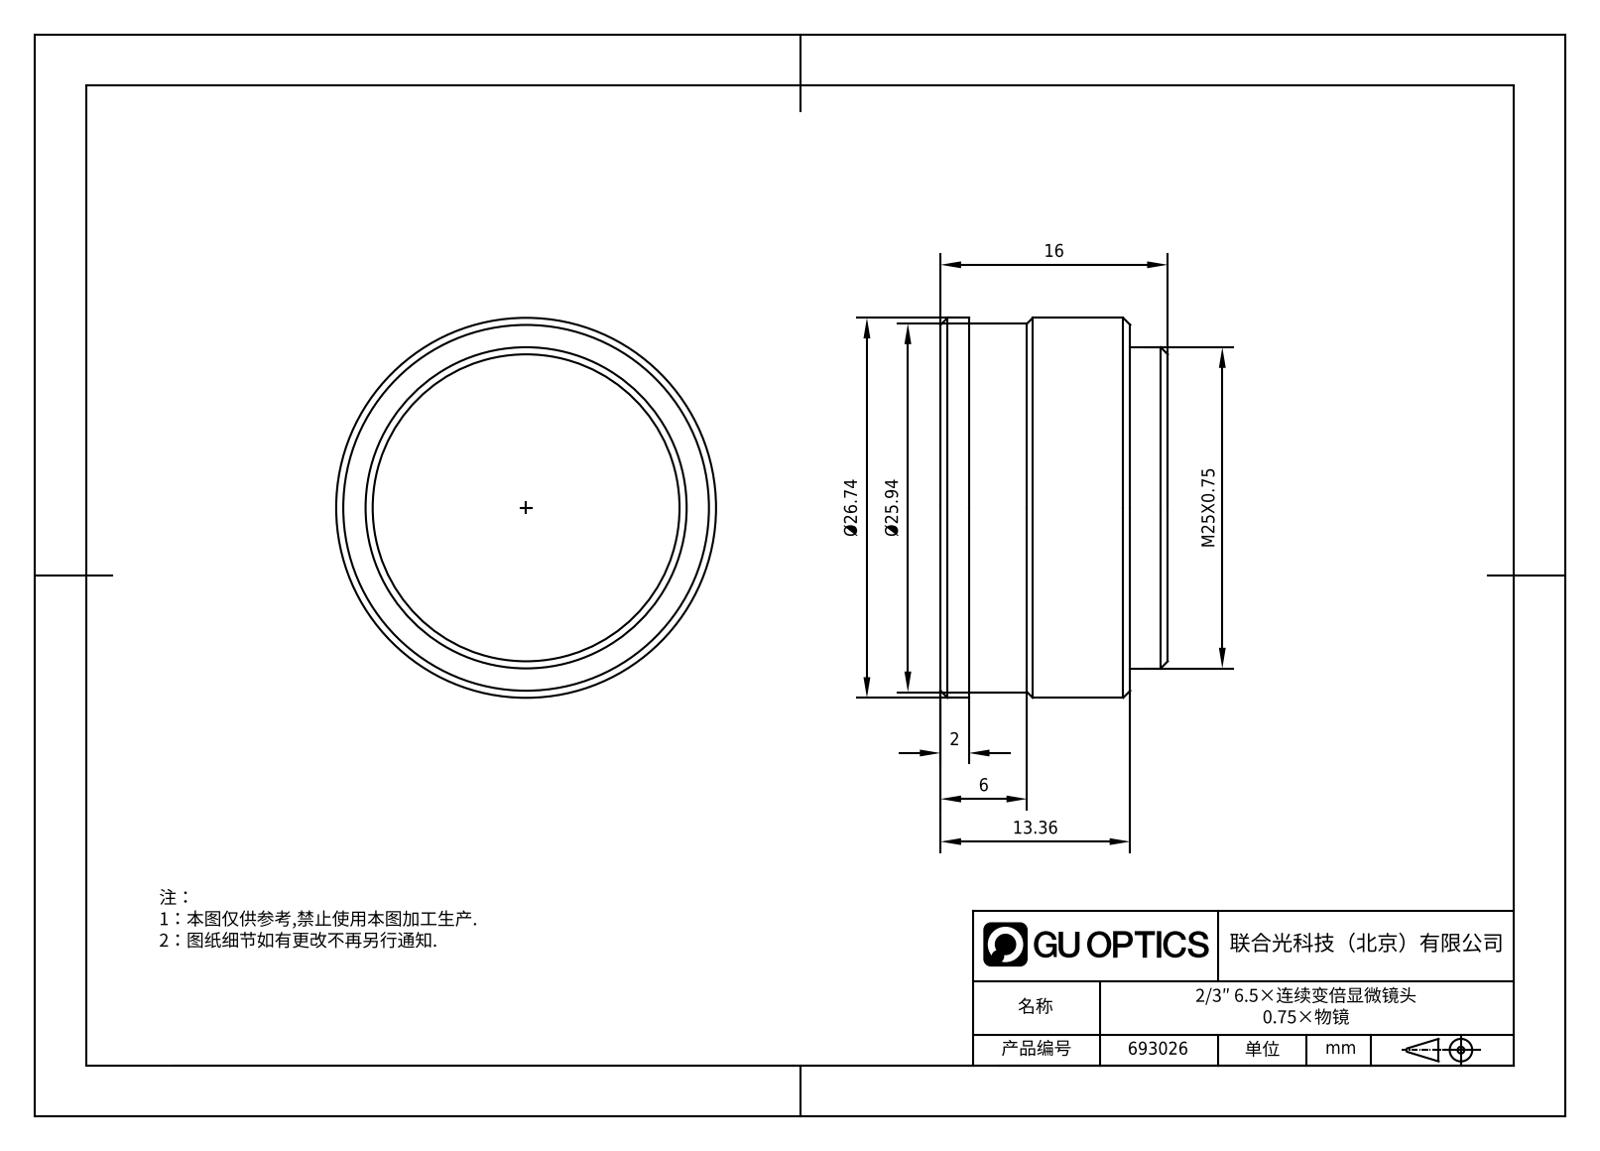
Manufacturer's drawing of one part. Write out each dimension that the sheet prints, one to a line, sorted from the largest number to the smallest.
Ø26.74
Ø25.94
M25X0.75
16
13.36
6
2
